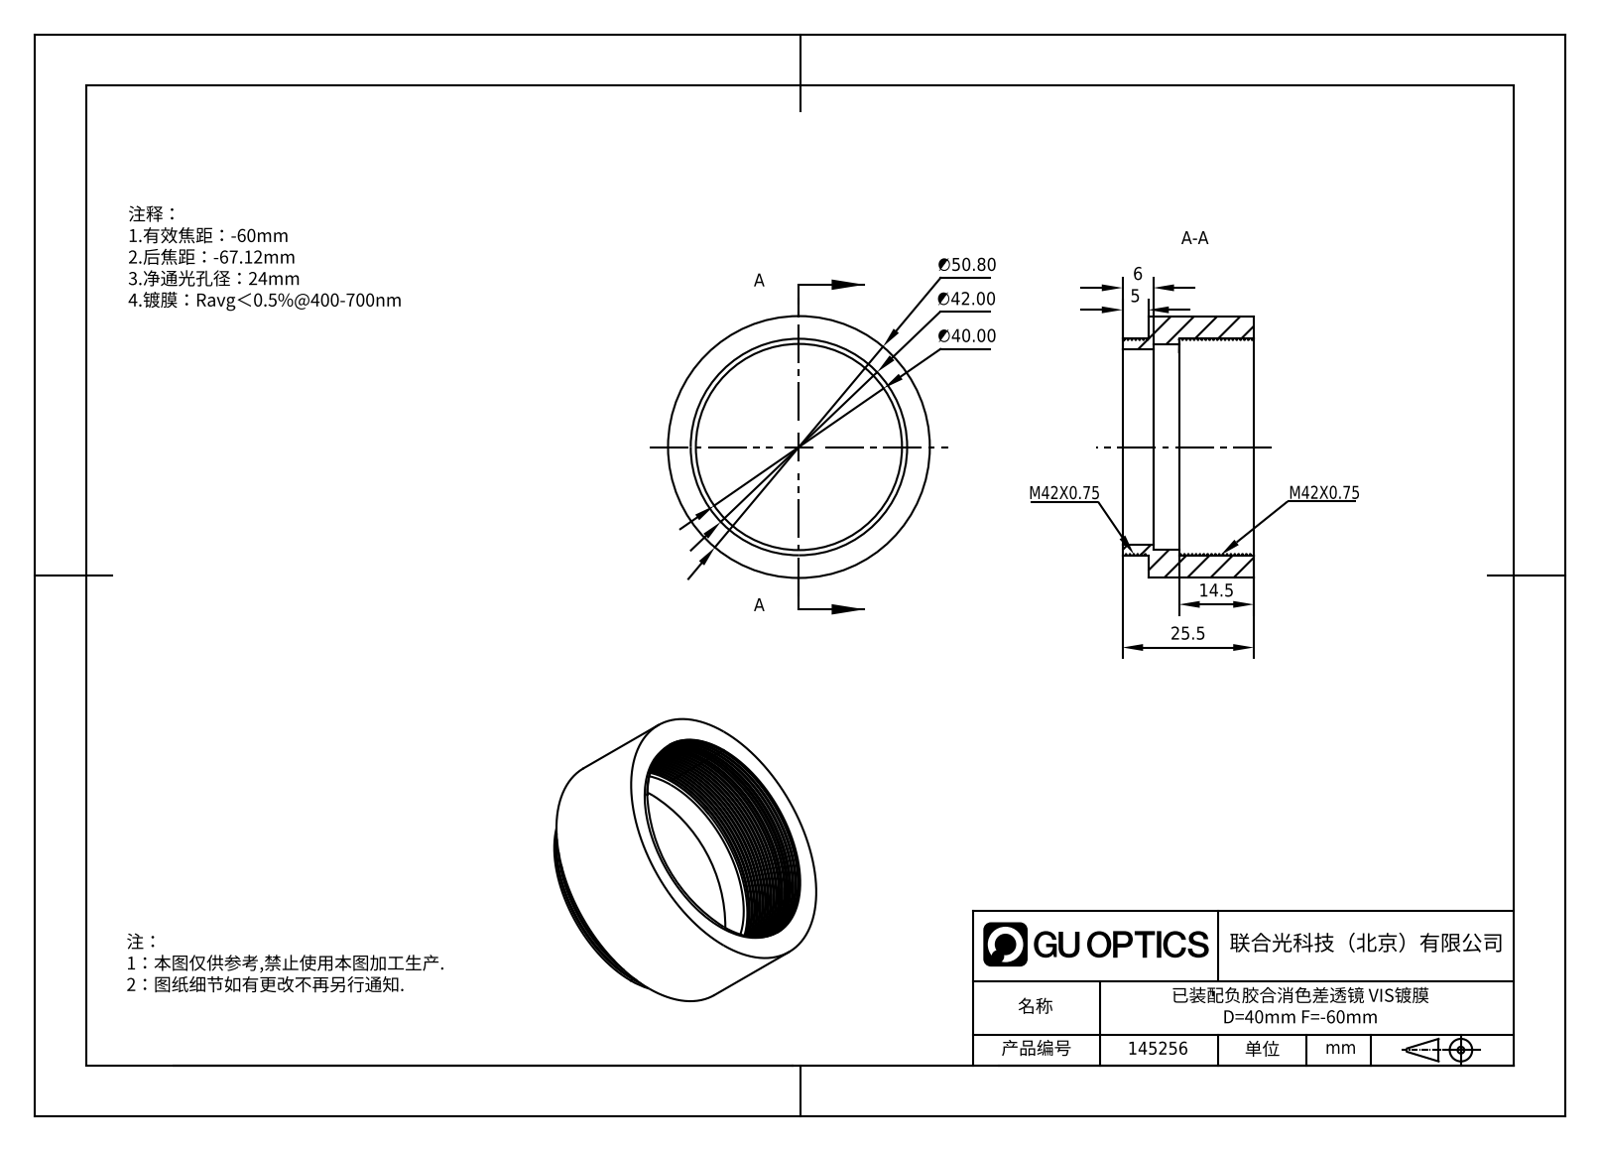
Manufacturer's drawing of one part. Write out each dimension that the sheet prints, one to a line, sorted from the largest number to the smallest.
∅50.80
∅42.00
∅40.00
25.5
14.5
6
5
